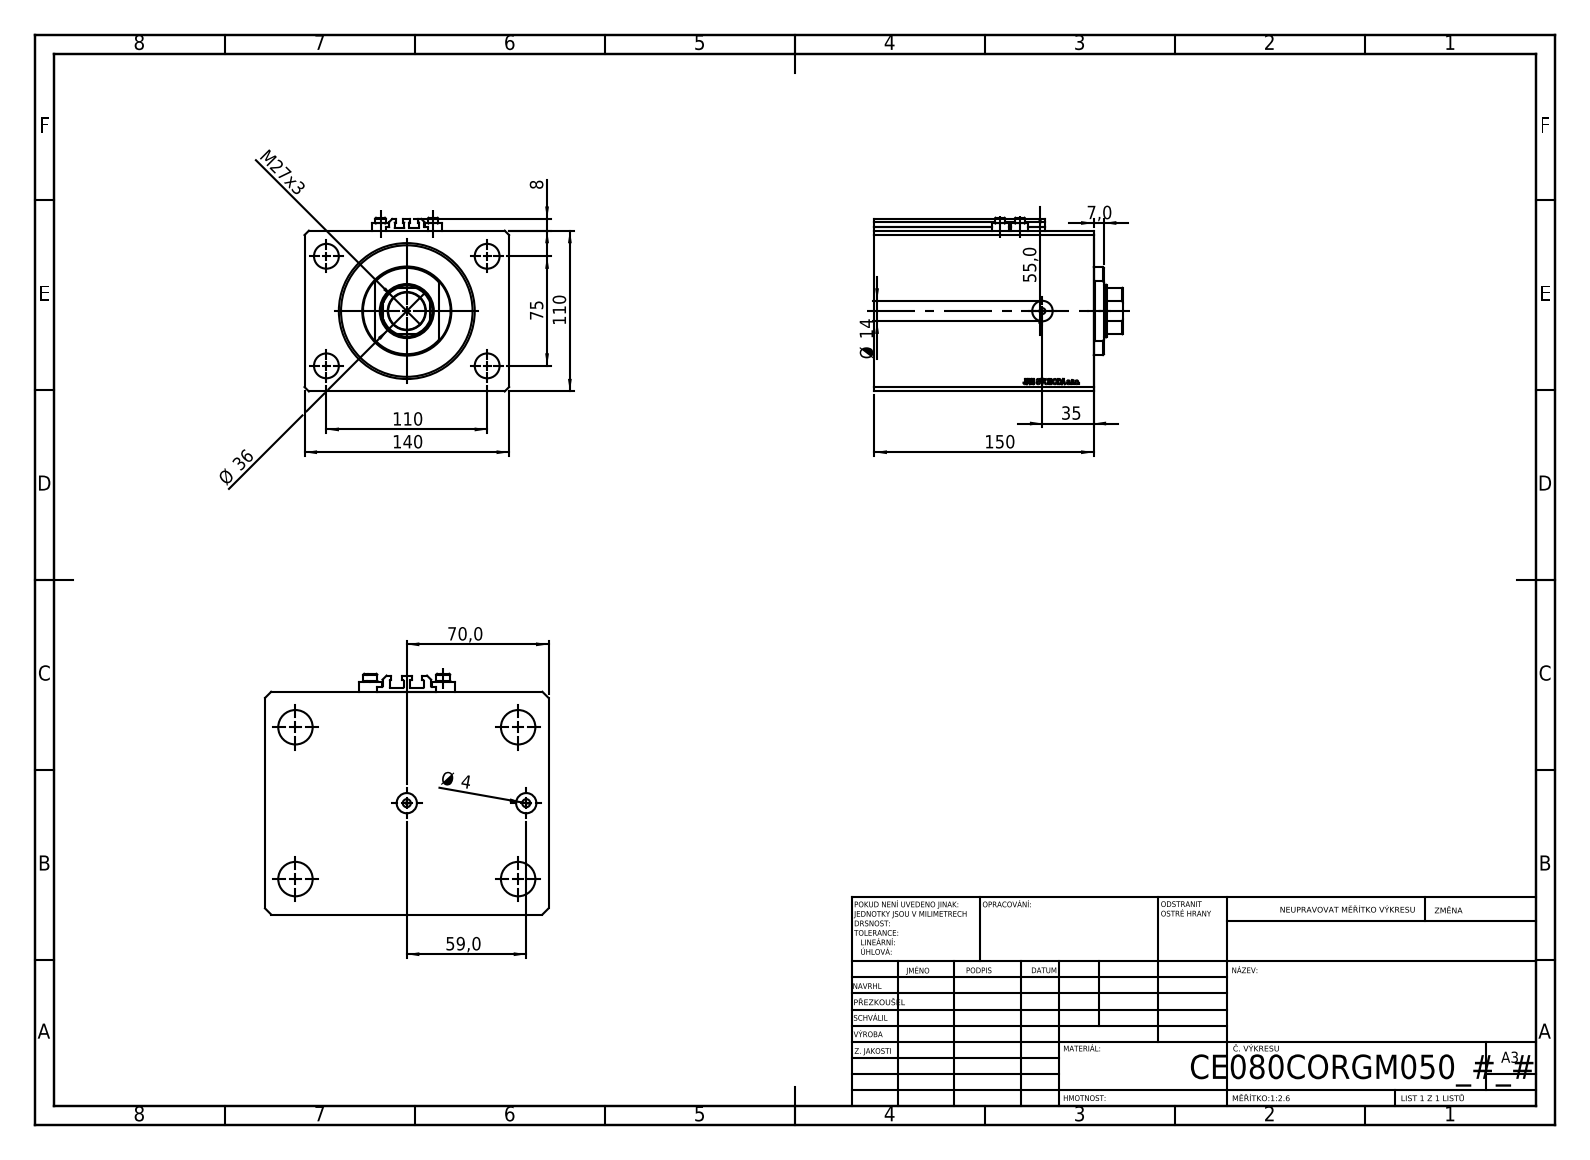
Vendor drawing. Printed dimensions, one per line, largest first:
150
140
110
110
75
70,0
59,0
55,0
Ø 36
35
M27x3
Ø 14
8
7,0
Ø 4
